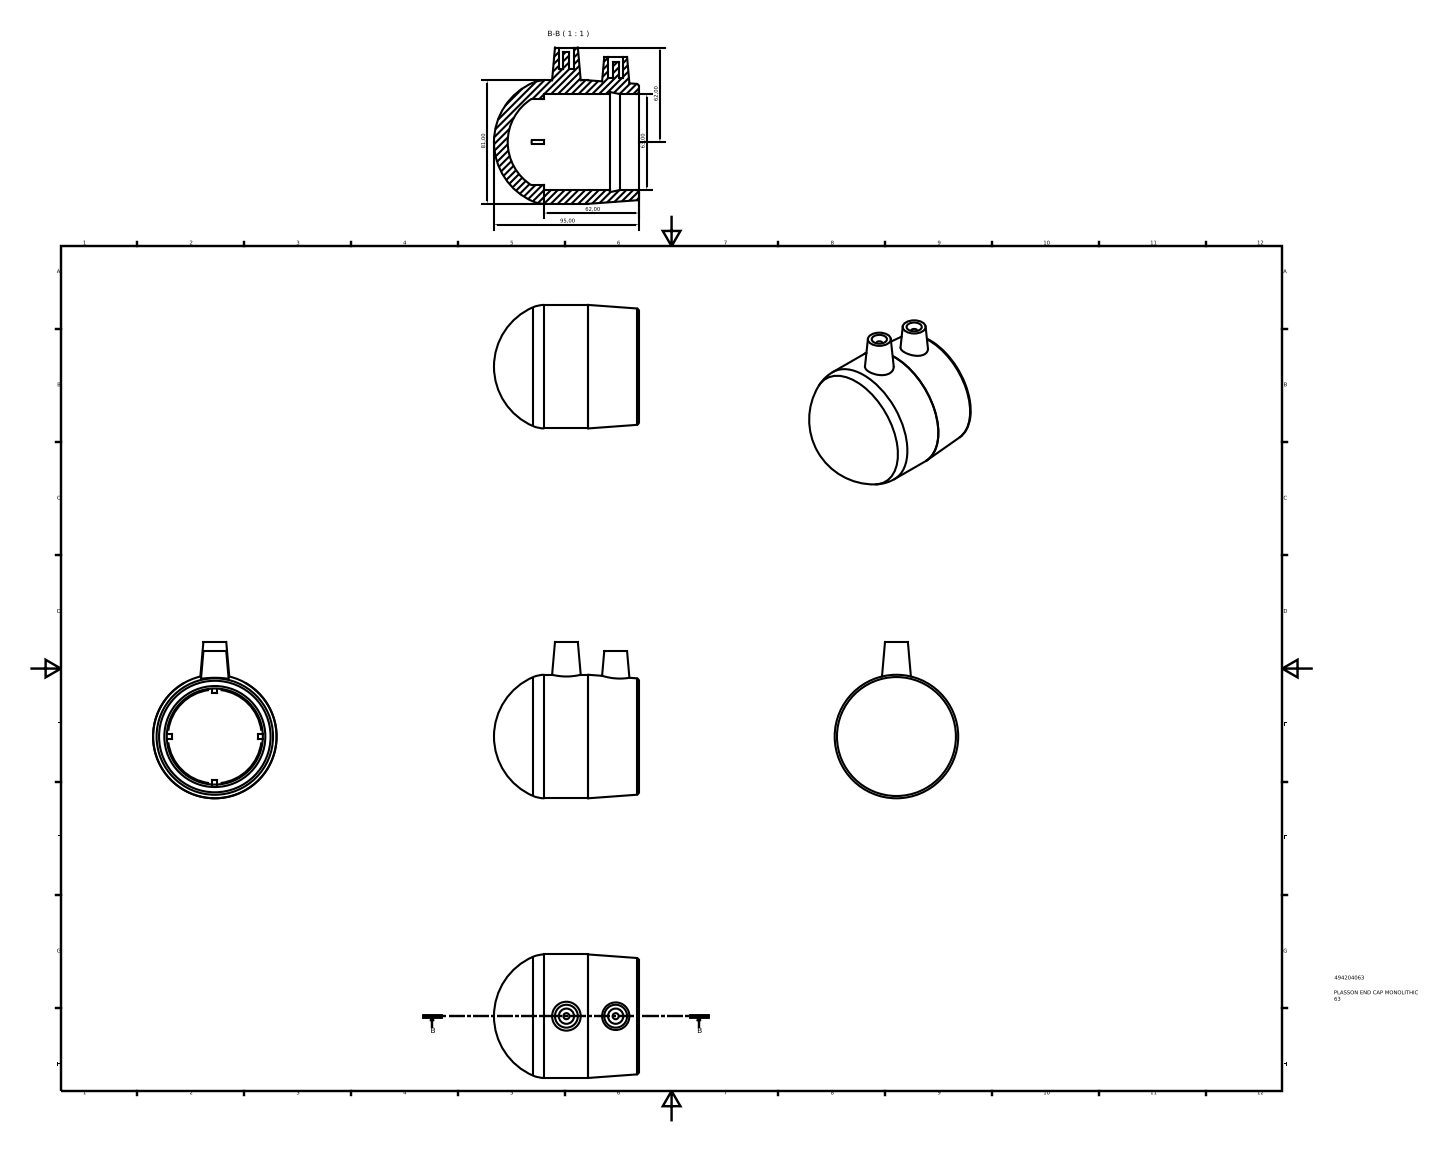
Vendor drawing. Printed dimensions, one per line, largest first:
95,00
81,00
63,00
62,00
62,00
